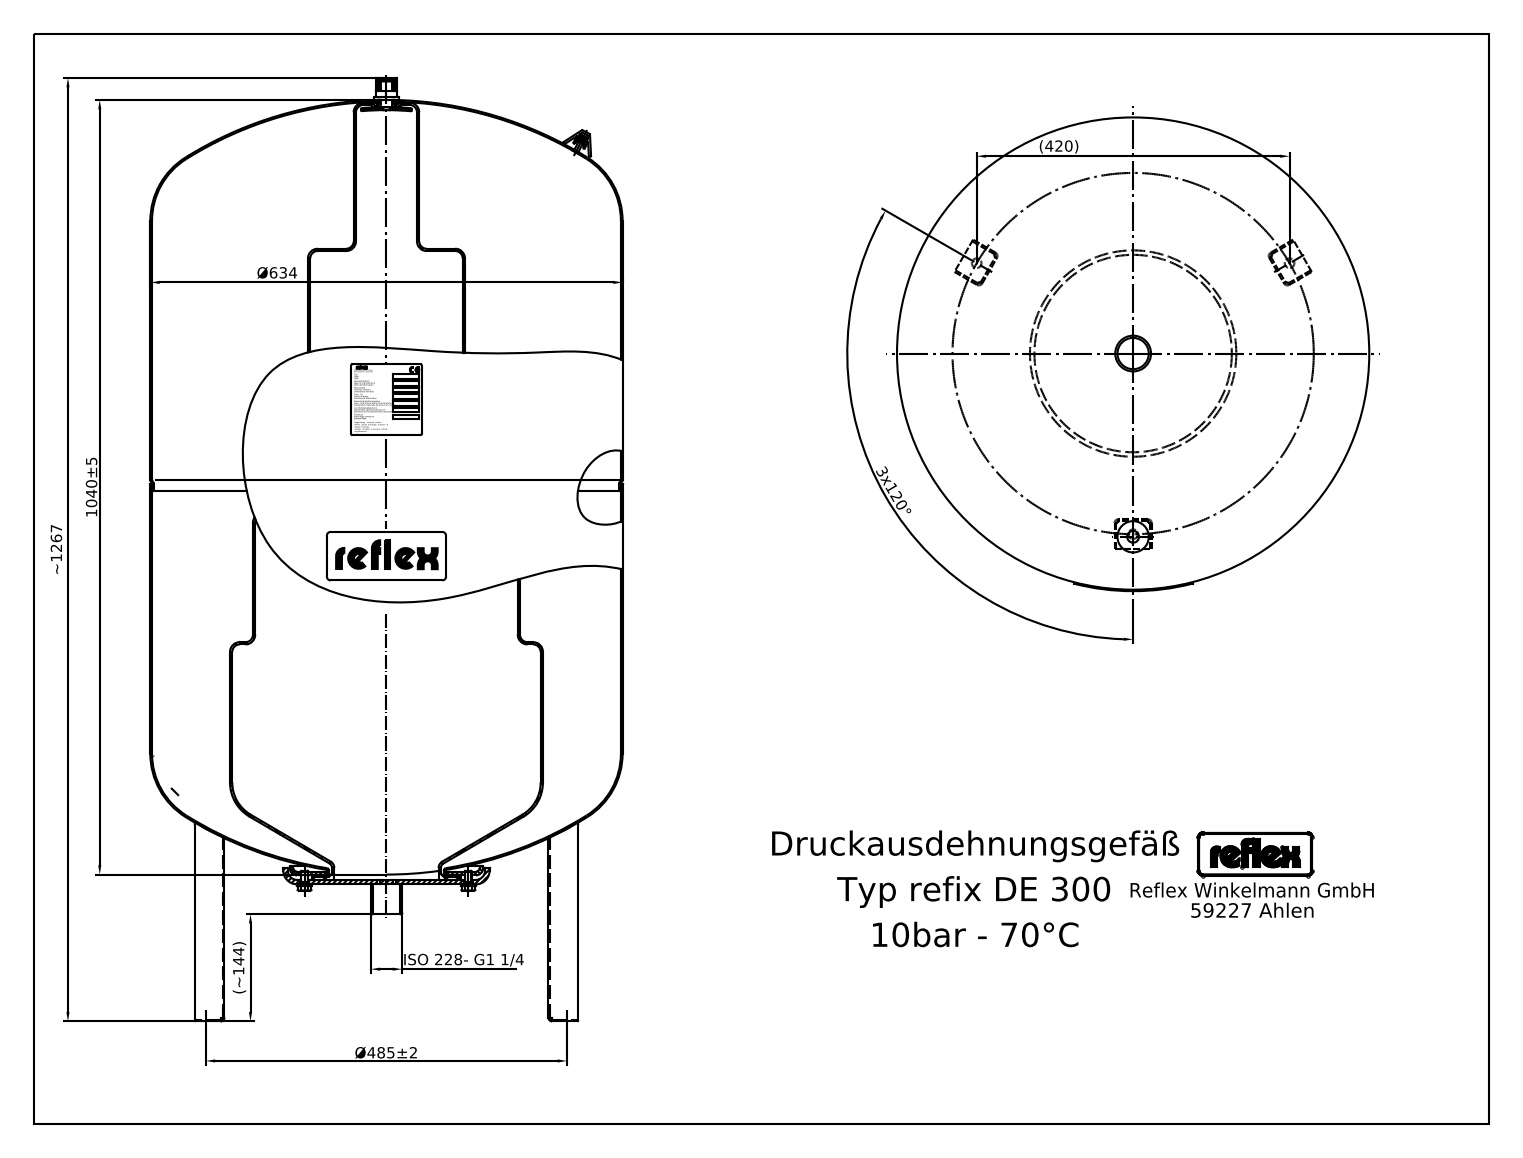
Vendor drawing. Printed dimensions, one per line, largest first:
~1267
1040±5
Ø634
Ø485±2
(420)
ISO 228- G1 1/4
(~144)
3x120°
